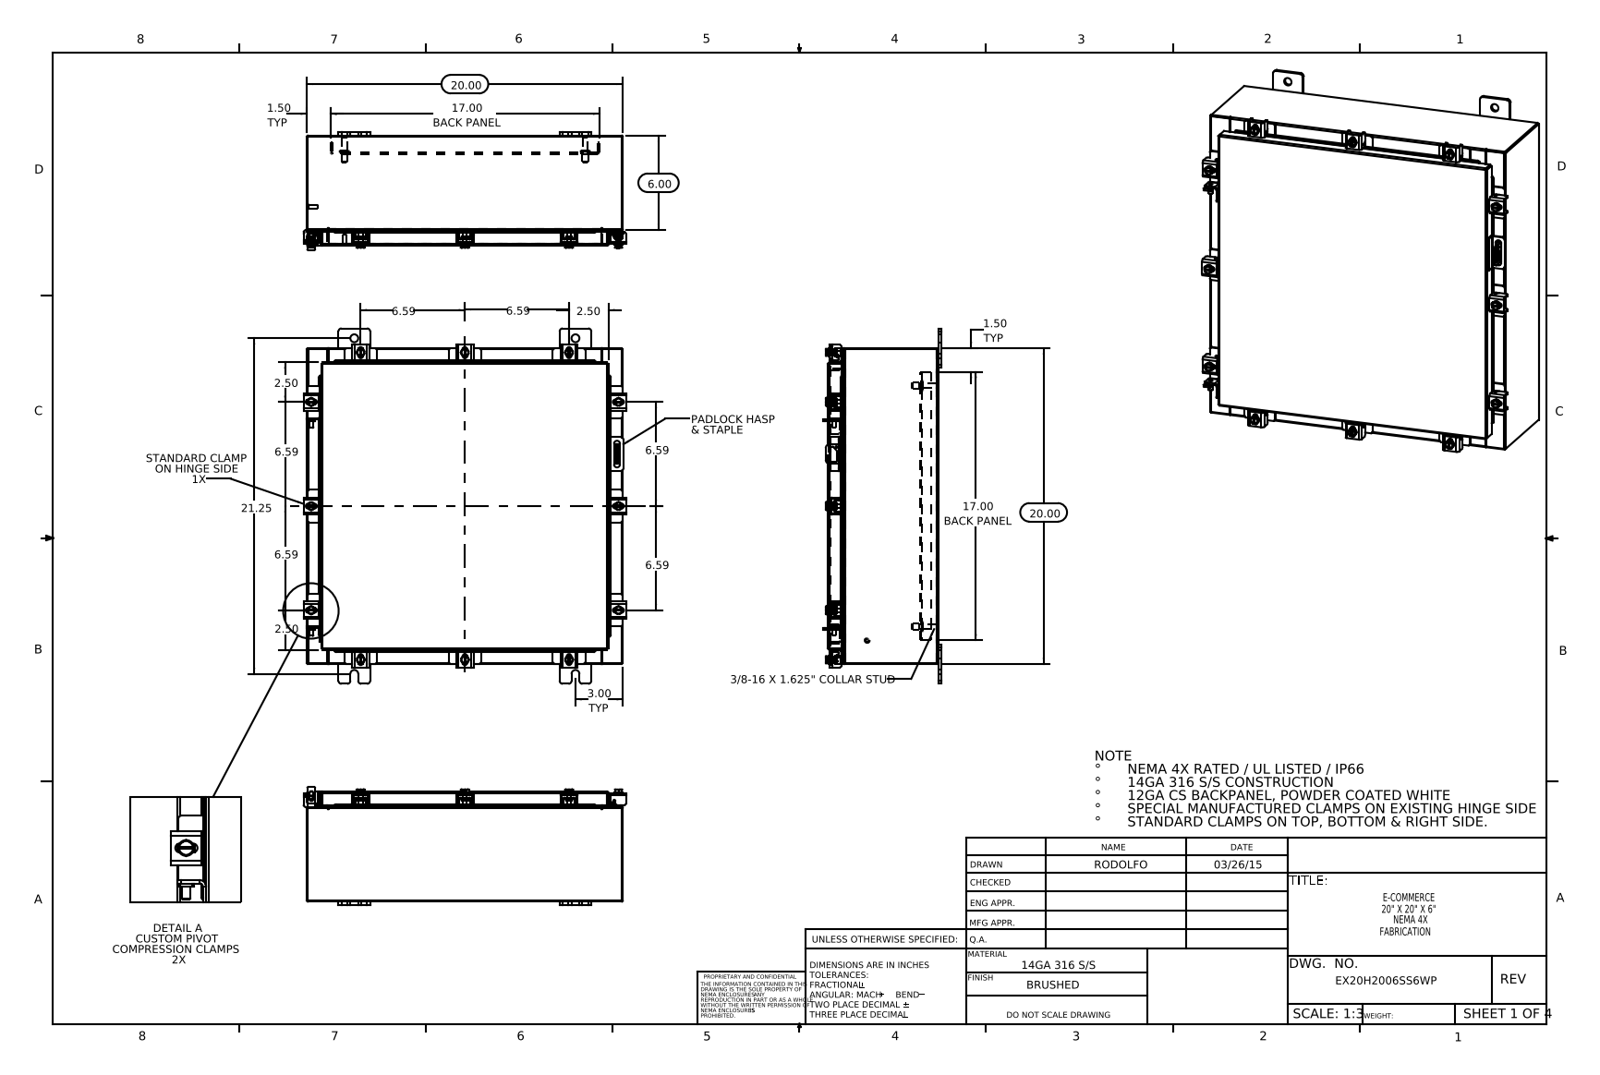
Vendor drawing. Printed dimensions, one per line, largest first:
21.25
20.00
20.00
17.00 BACK PANEL
17.00 BACK PANEL
6.59
6.59
6.59
6.59
6.59
6.59
6.00
3.00 TYP
2.50
2.50
2.50
1.50 TYP
1.50 TYP
